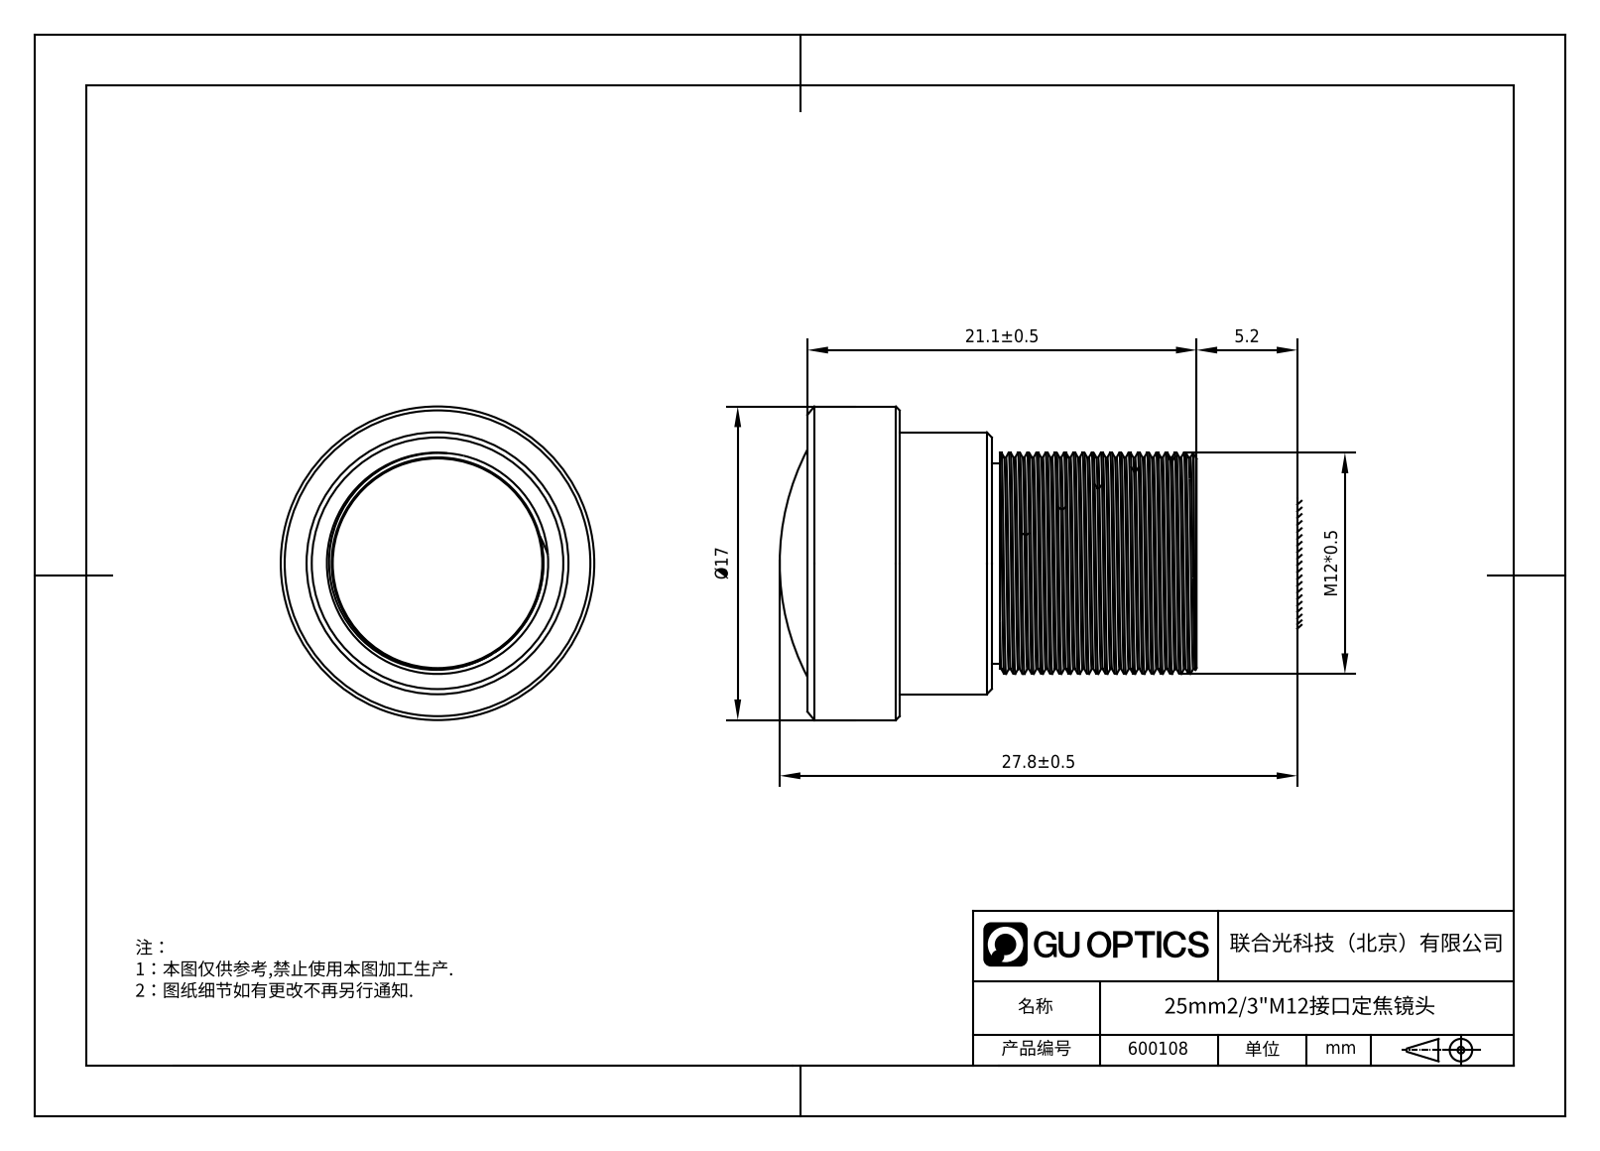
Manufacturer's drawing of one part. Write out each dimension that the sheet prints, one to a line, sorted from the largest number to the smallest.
27.8±0.5
21.1±0.5
Ø17
M12*0.5
5.2
